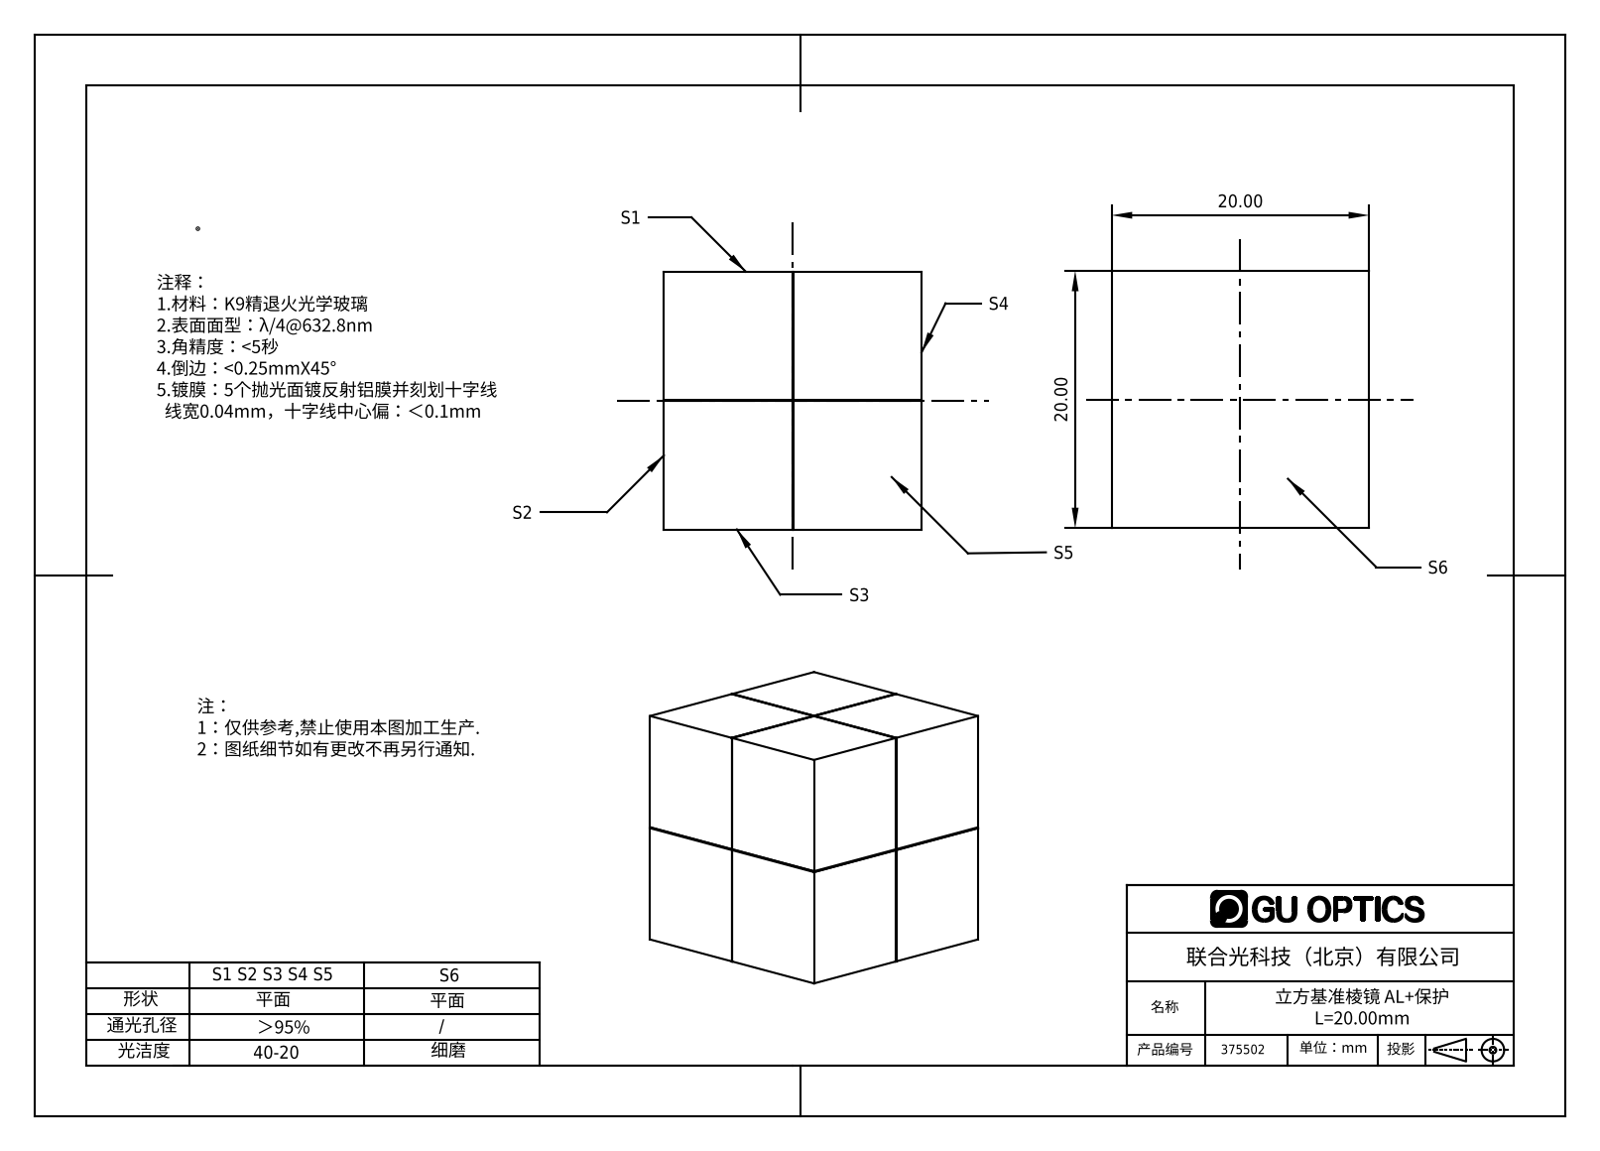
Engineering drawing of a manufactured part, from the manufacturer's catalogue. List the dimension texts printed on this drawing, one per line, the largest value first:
20.00
20.00
